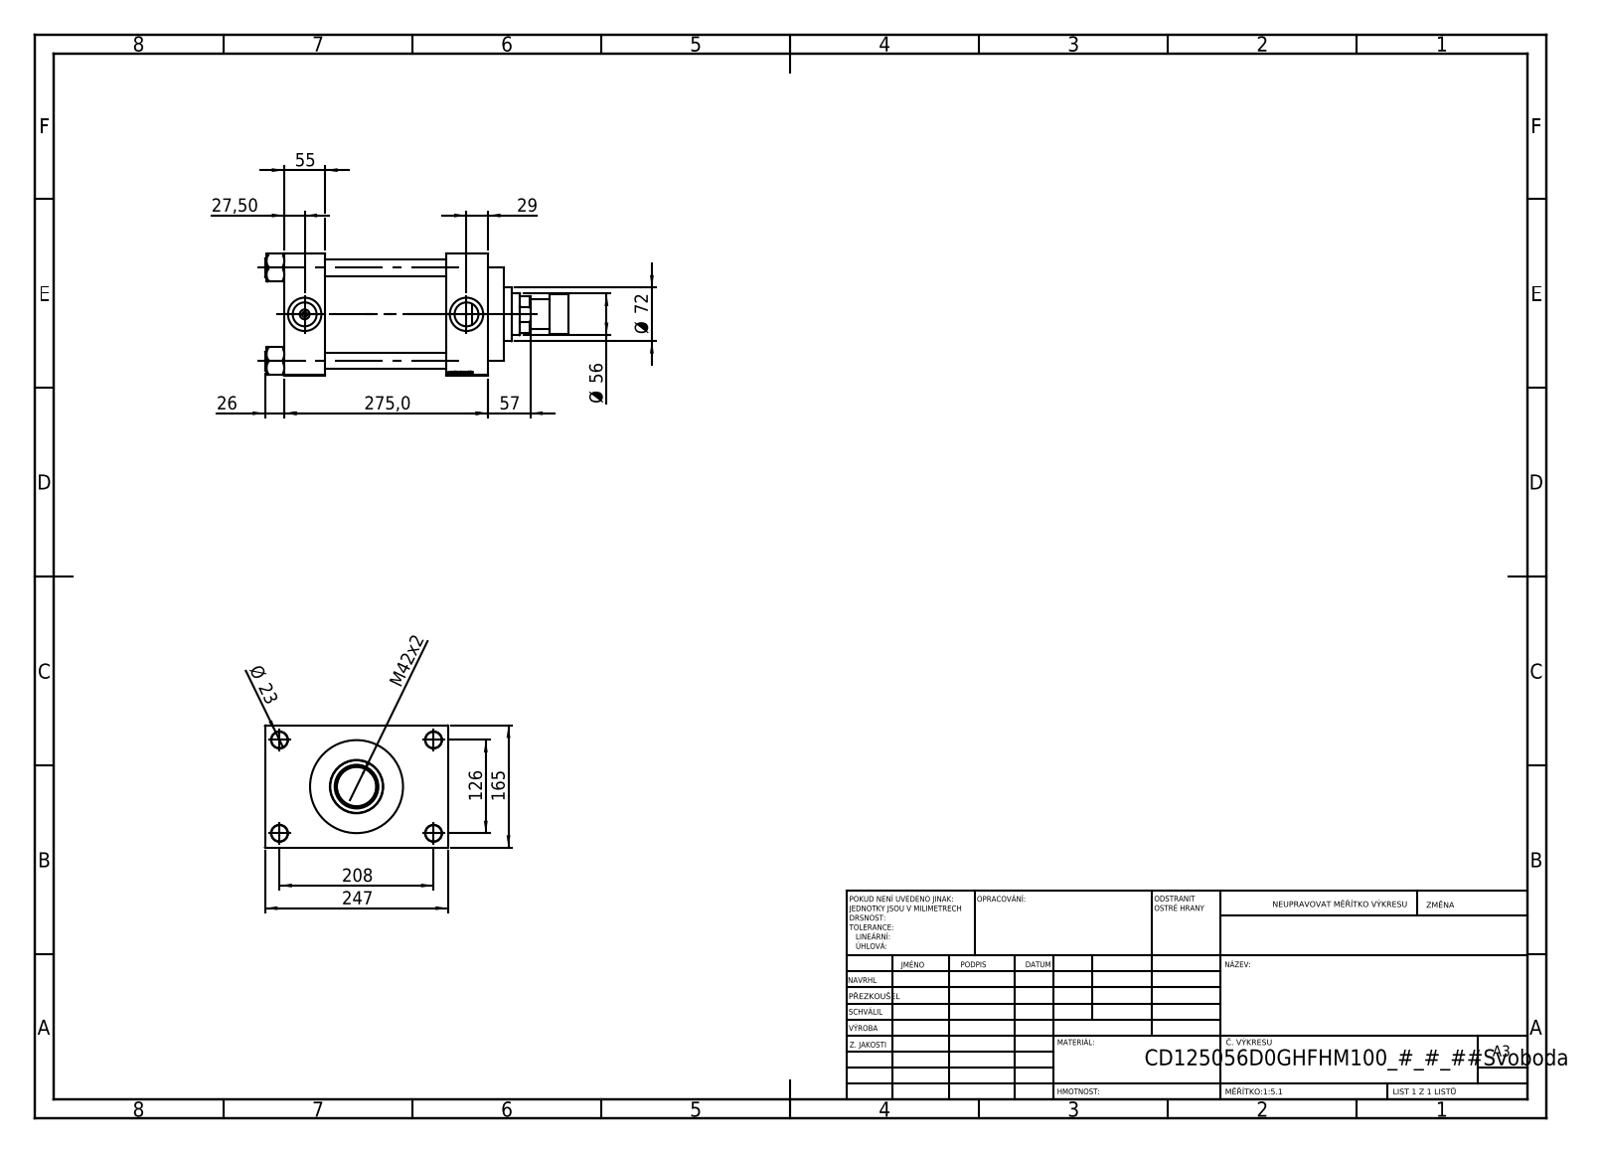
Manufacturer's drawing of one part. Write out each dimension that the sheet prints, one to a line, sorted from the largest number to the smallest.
275,0
247
208
165
126
Ø 72
57
Ø 56
55
M42x2
29
27,50
26
Ø 23
